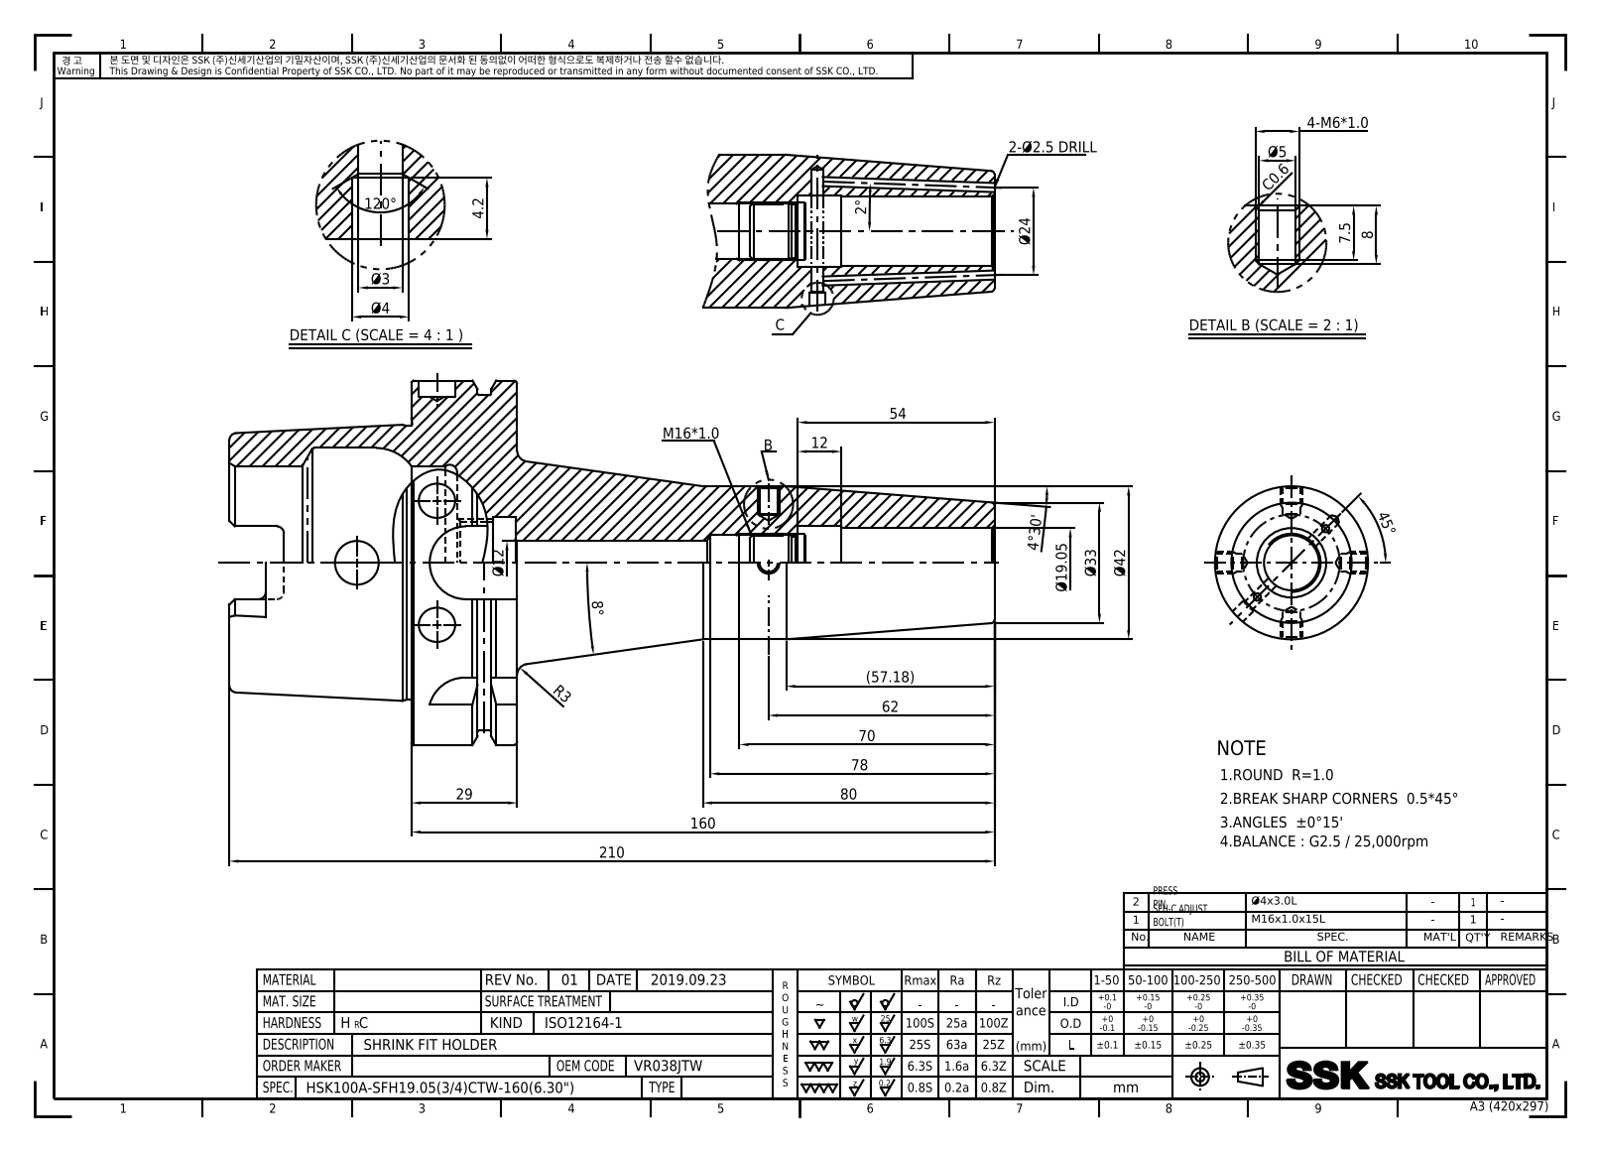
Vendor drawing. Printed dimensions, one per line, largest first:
210
160
120°
80
78
70
62
(57.18)
54
45°
Ø42
Ø33
29
Ø24
Ø19.05
12
Ø12
8
8°
7.5
4-M6*1.0
Ø5
4.2
4°30'
Ø4
Ø3
R3
2°
C0.6
